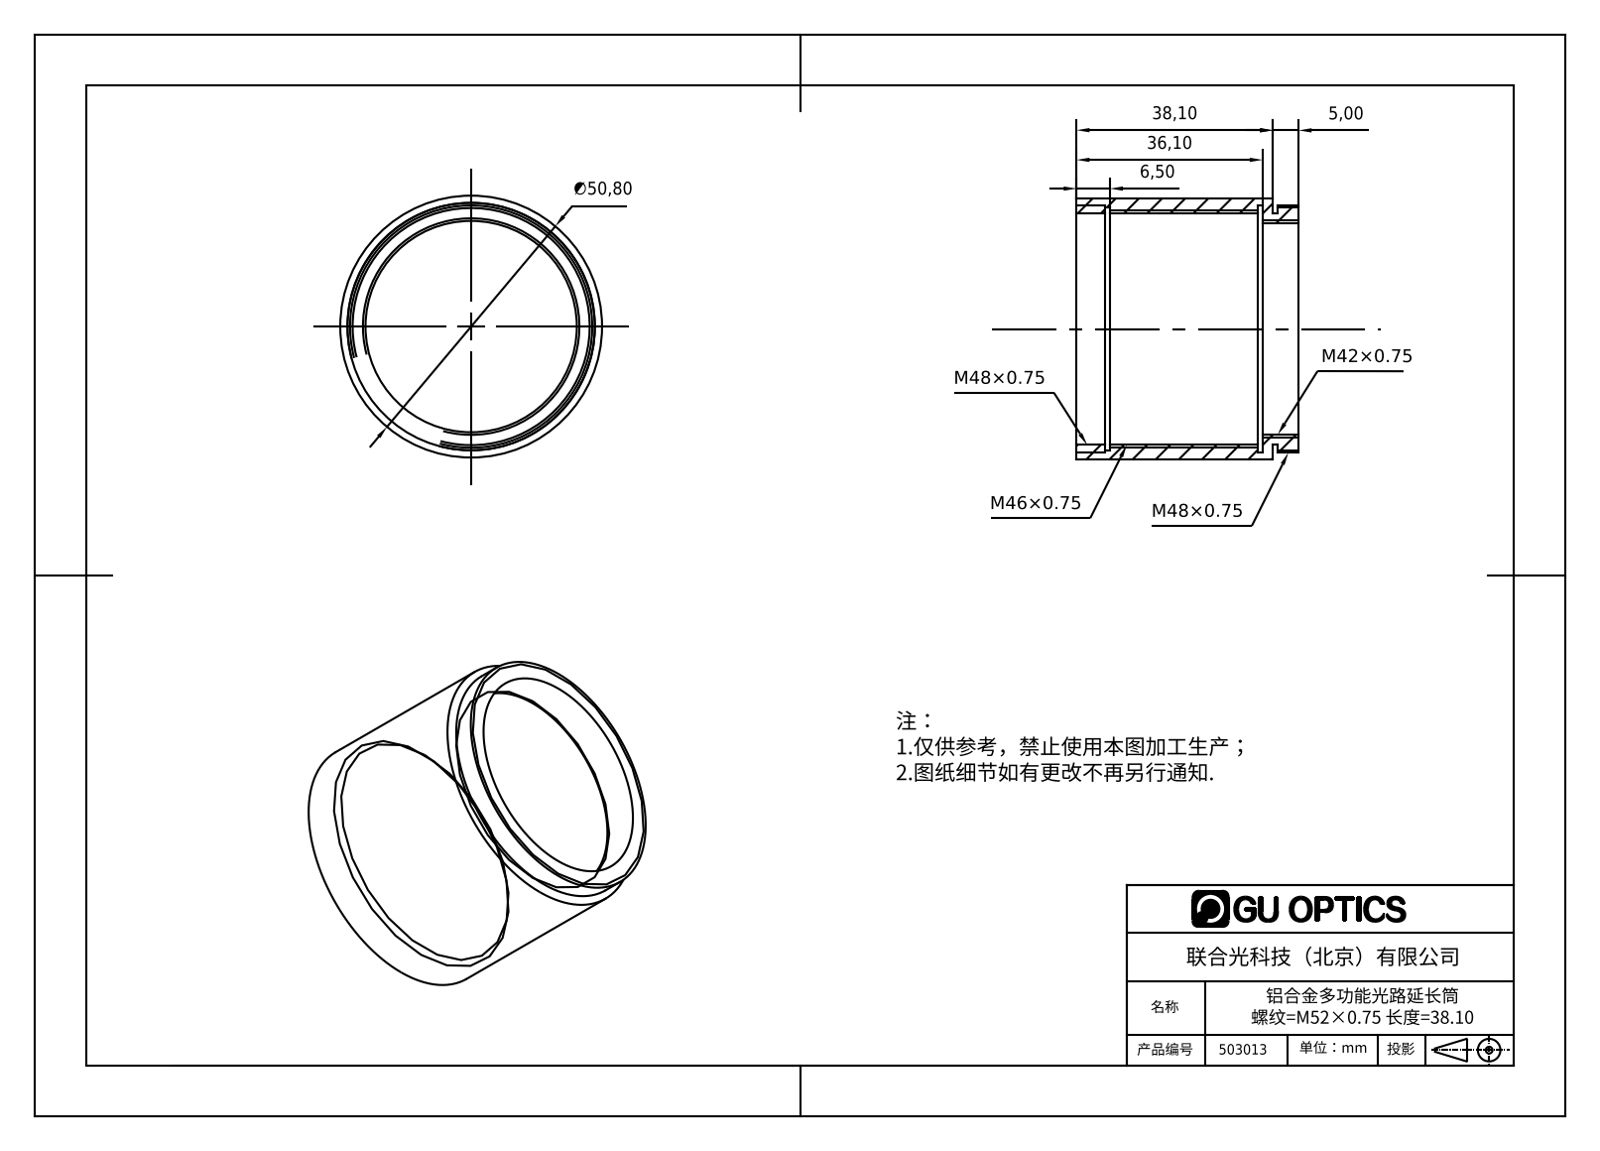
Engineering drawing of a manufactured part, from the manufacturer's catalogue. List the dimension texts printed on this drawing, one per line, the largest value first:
∅50,80
38,10
36,10
6,50
5,00
